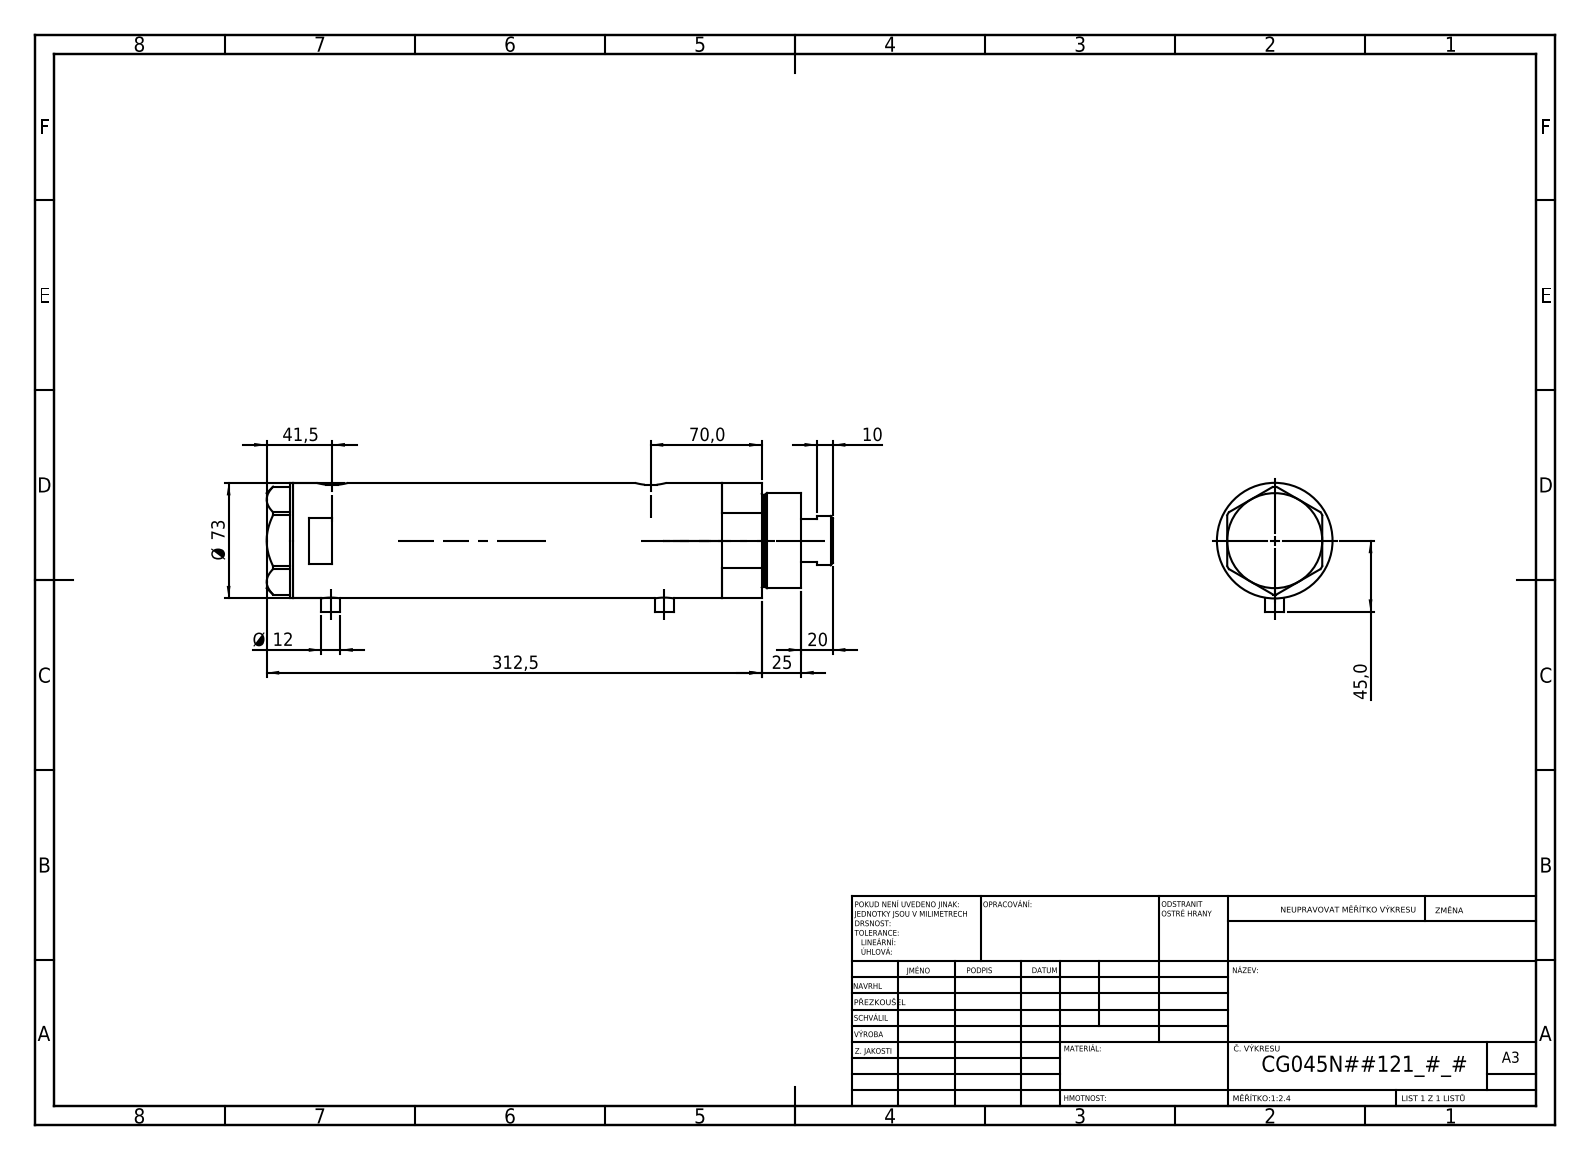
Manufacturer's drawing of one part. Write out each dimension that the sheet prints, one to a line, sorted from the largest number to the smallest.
312,5
Ø 73
70,0
45,0
41,5
25
20
Ø 12
10
